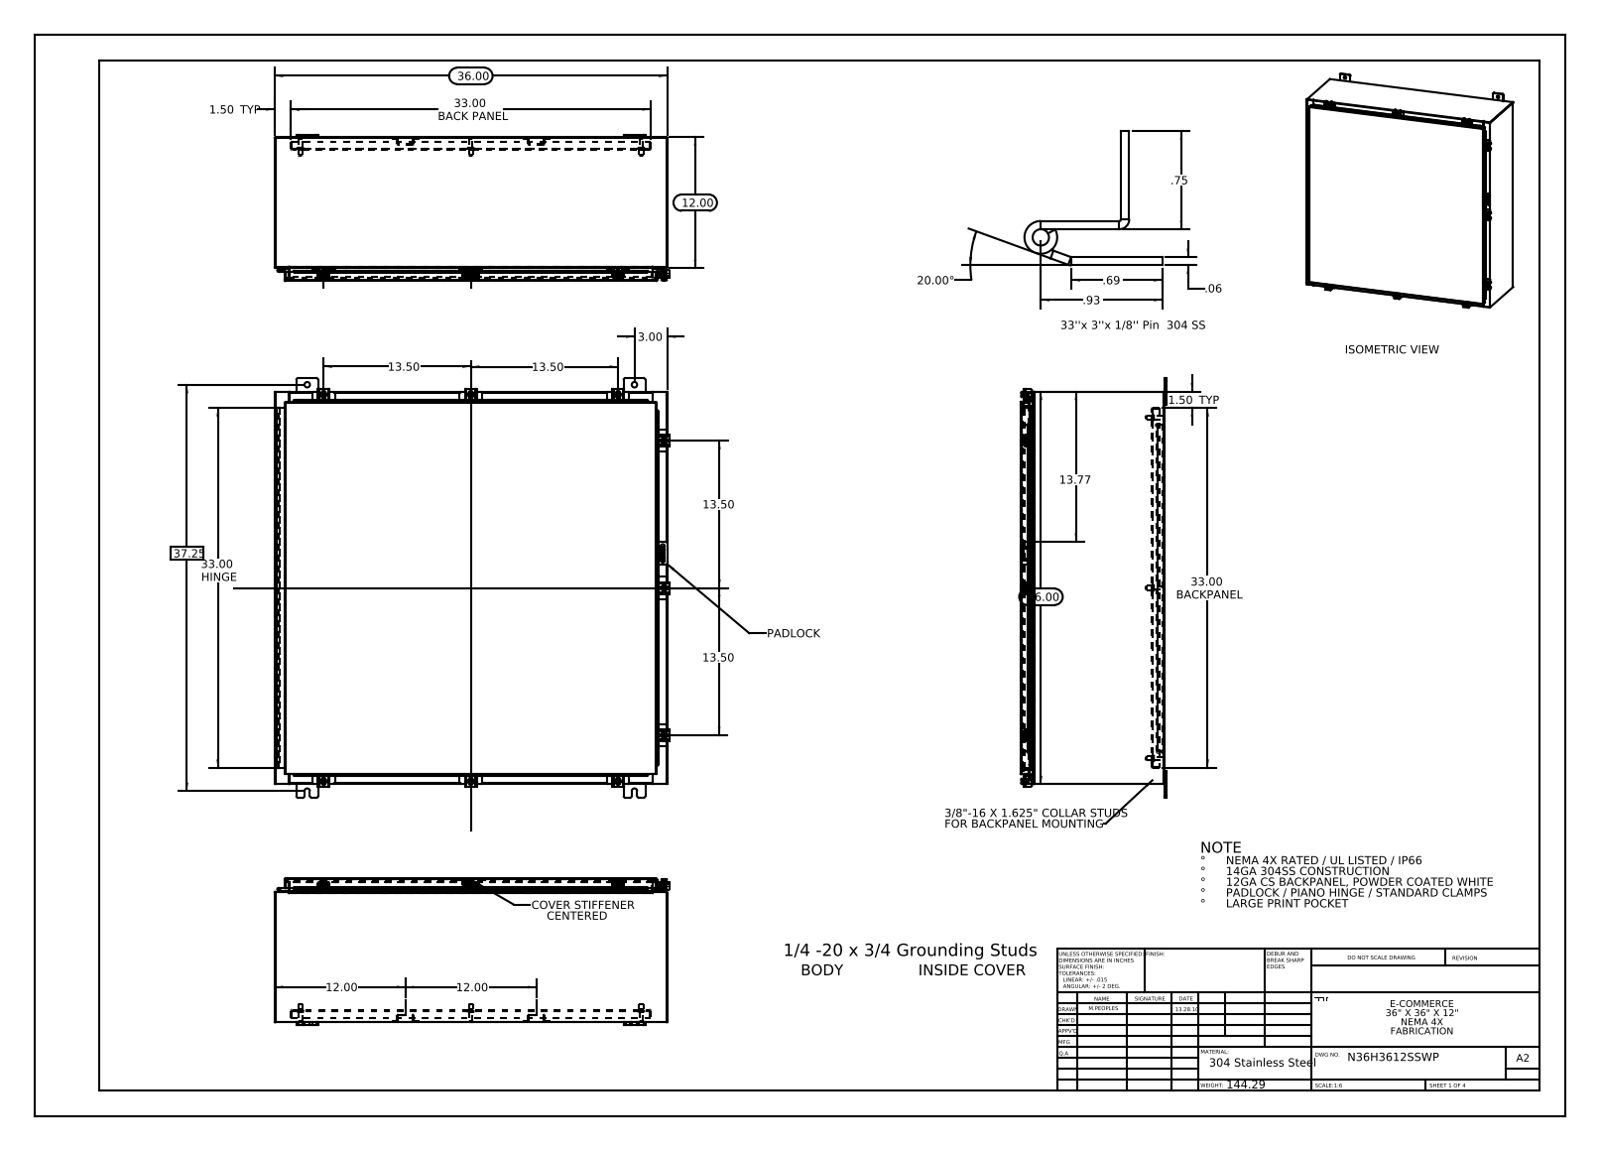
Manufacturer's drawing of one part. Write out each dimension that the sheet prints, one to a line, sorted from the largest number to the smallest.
37.25
36.00
36.00
33.00 HINGE
33.00 BACK PANEL
33.00 BACKPANEL
20.00°
13.77
13.50
13.50
13.50
13.50
12.00
12.00
12.00
3.00
1.50 TYP
1.50 TYP
.93
.75
.69
.06
